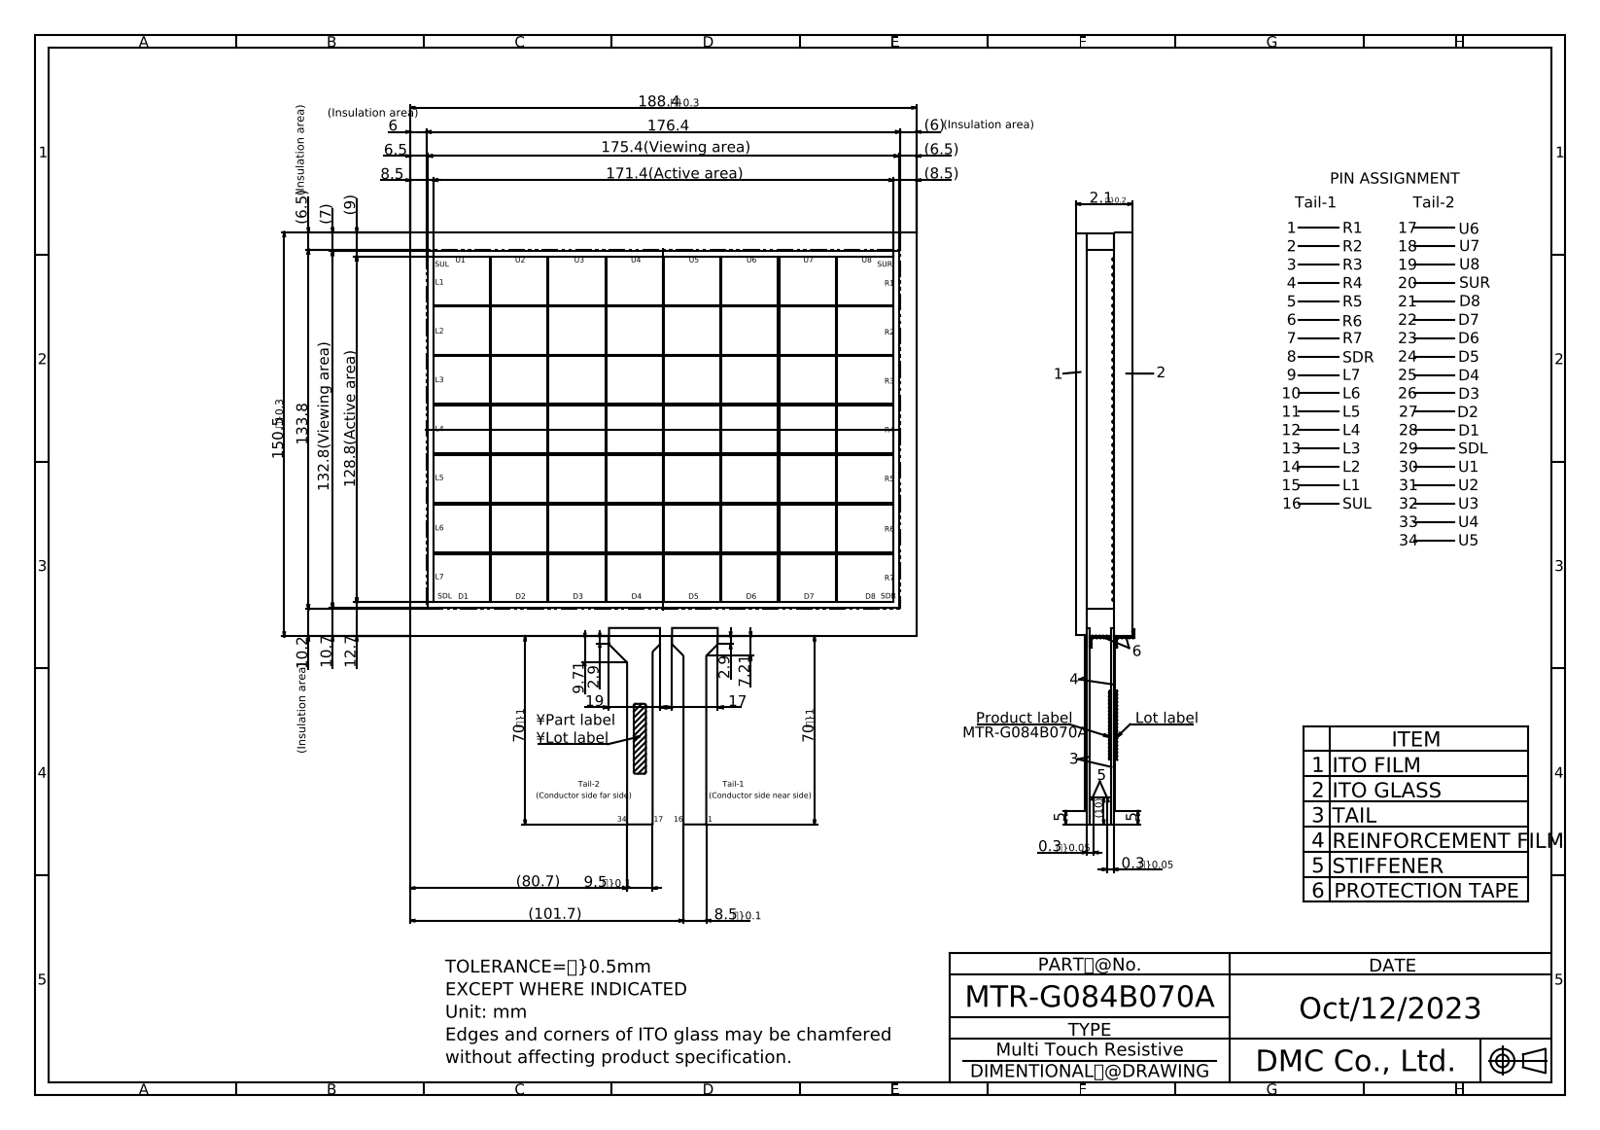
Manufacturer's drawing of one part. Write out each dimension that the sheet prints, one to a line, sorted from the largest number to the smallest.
188.40
176.4
175.4(Viewing area)
171.4(Active area)
150.50
133.8
132.8(Viewing area)
128.8(Active area)
(101.7)
(80.7)
70.00
70.00
19
17
12.7
10.7
10.2
(10)
9.71
9.50
(9)
(8.5)
8.5
8.50
7.21
(7)
(6.5)
(6.5)
6.5
(6)
6
5
5
2.9
2.9
2.1{\H0.5x;?}0.2}
0.3{\H0.66667x;?}0.05}
0.3{\H0.66667x;?}0.05}
